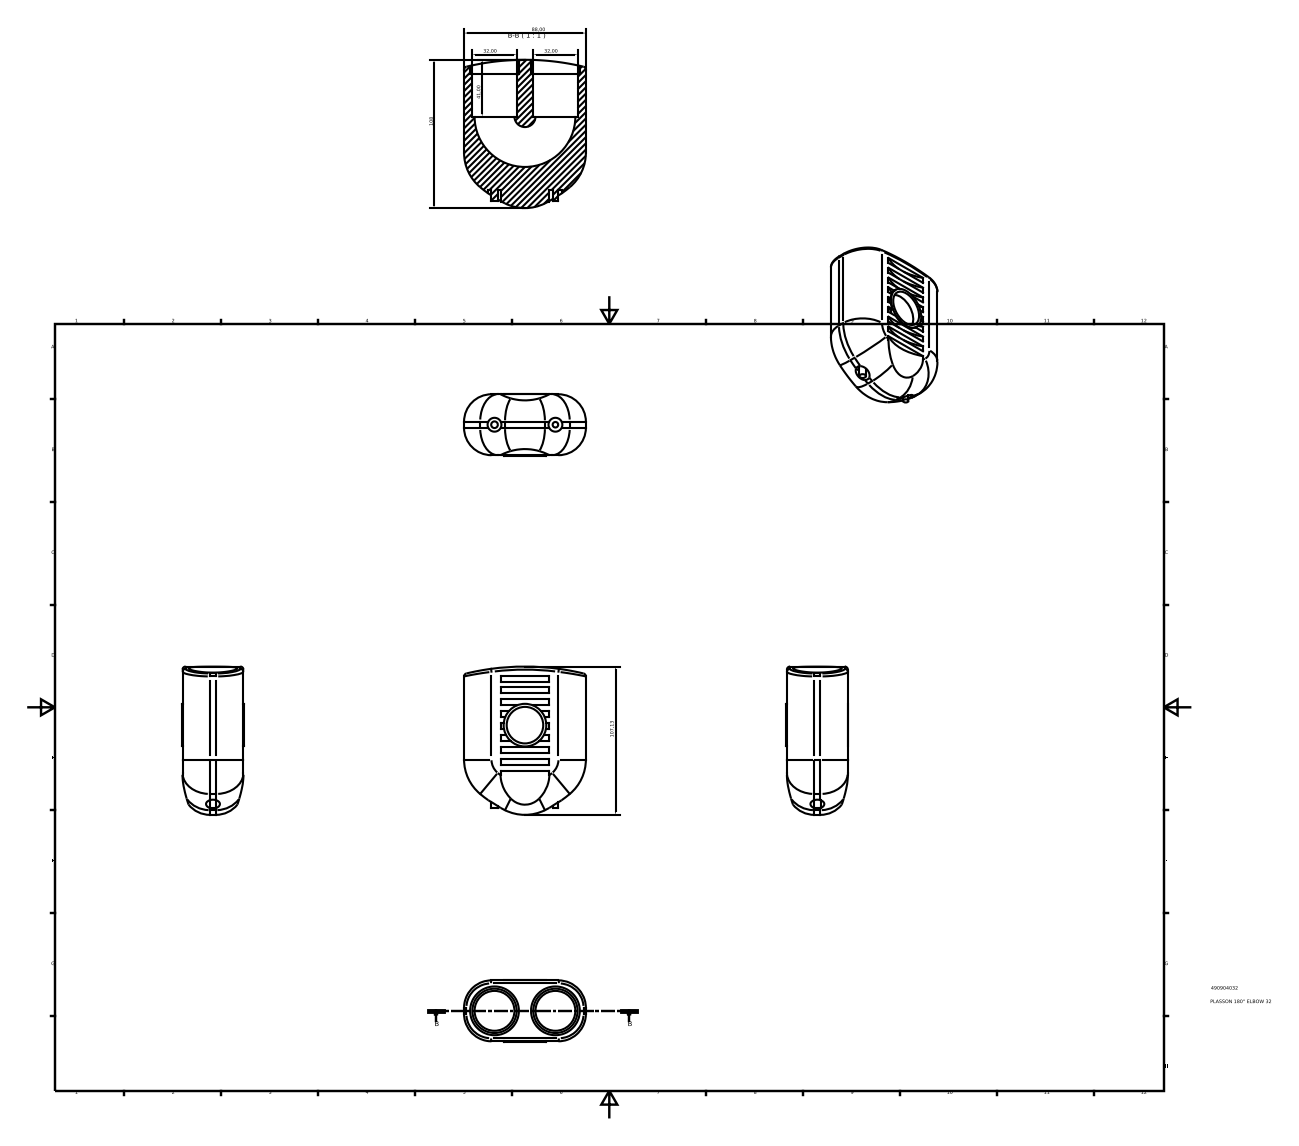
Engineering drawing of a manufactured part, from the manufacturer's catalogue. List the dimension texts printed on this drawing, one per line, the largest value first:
108
107,13
88,00
41,00
32,00
32,00
